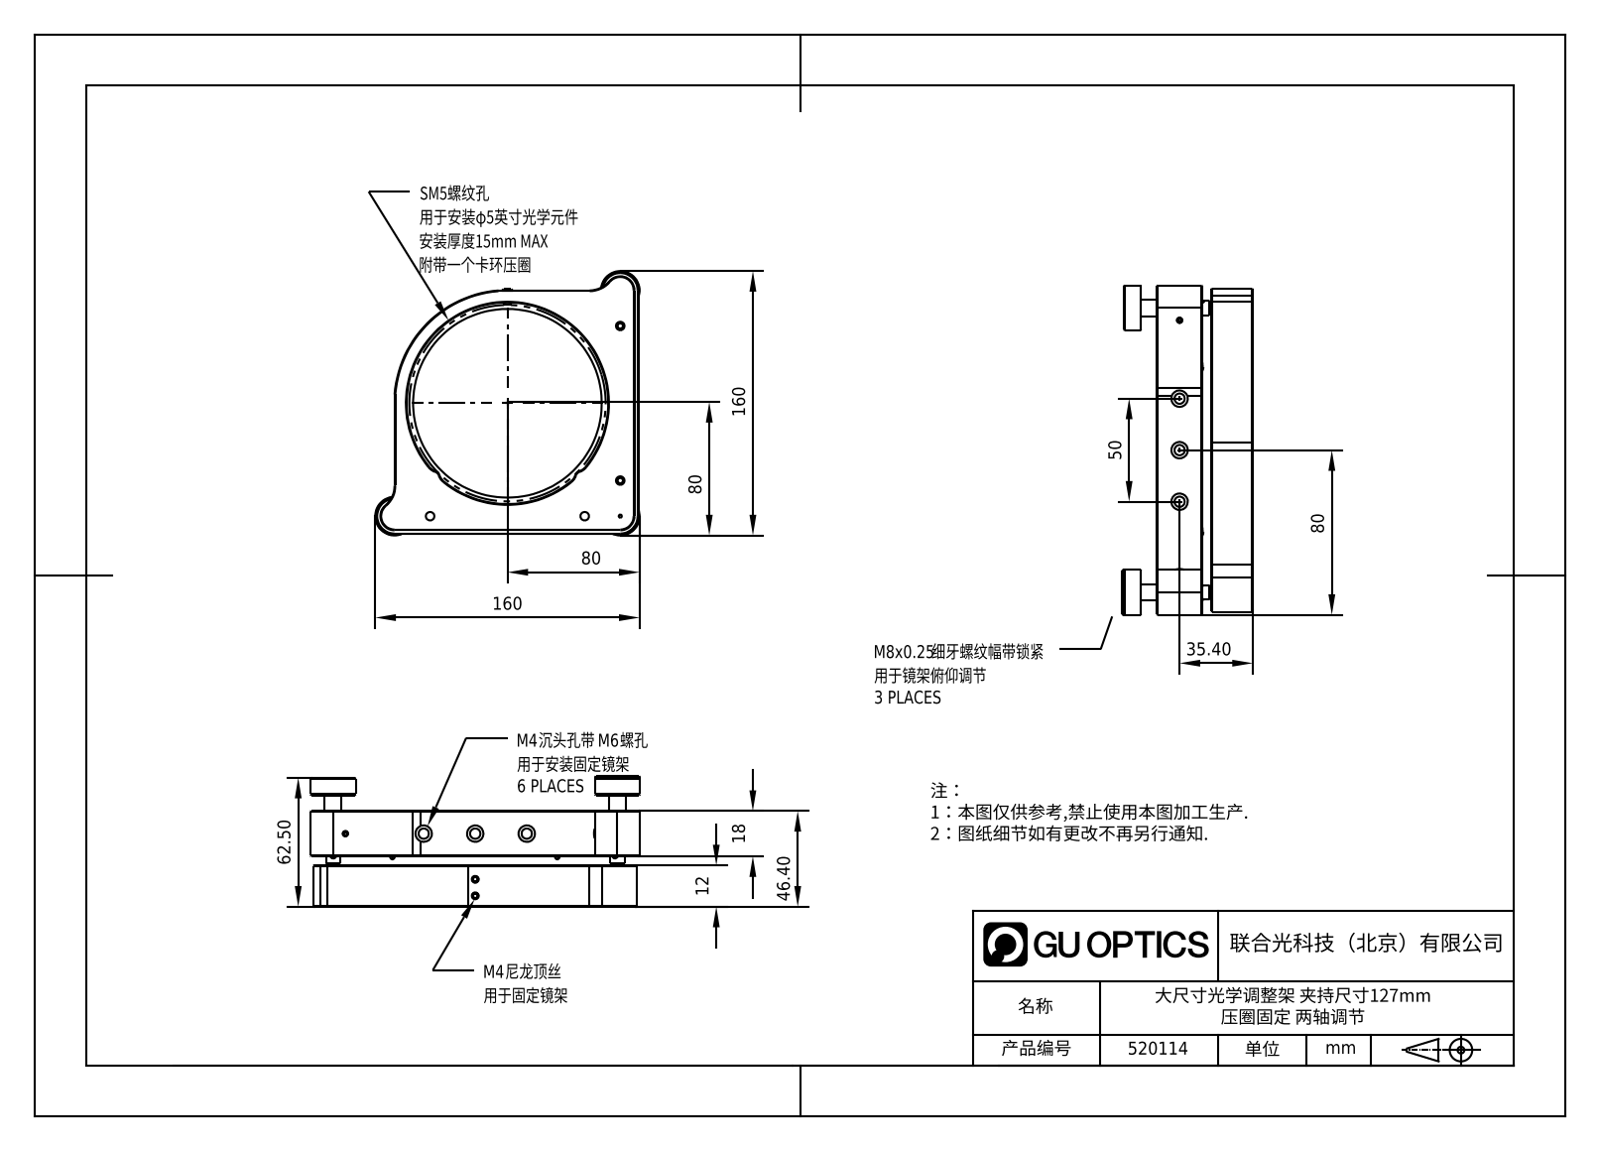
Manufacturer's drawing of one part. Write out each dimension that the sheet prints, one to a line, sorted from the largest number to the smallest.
160
160
80
80
80
62.50
50
46.40
35.40
18
12
